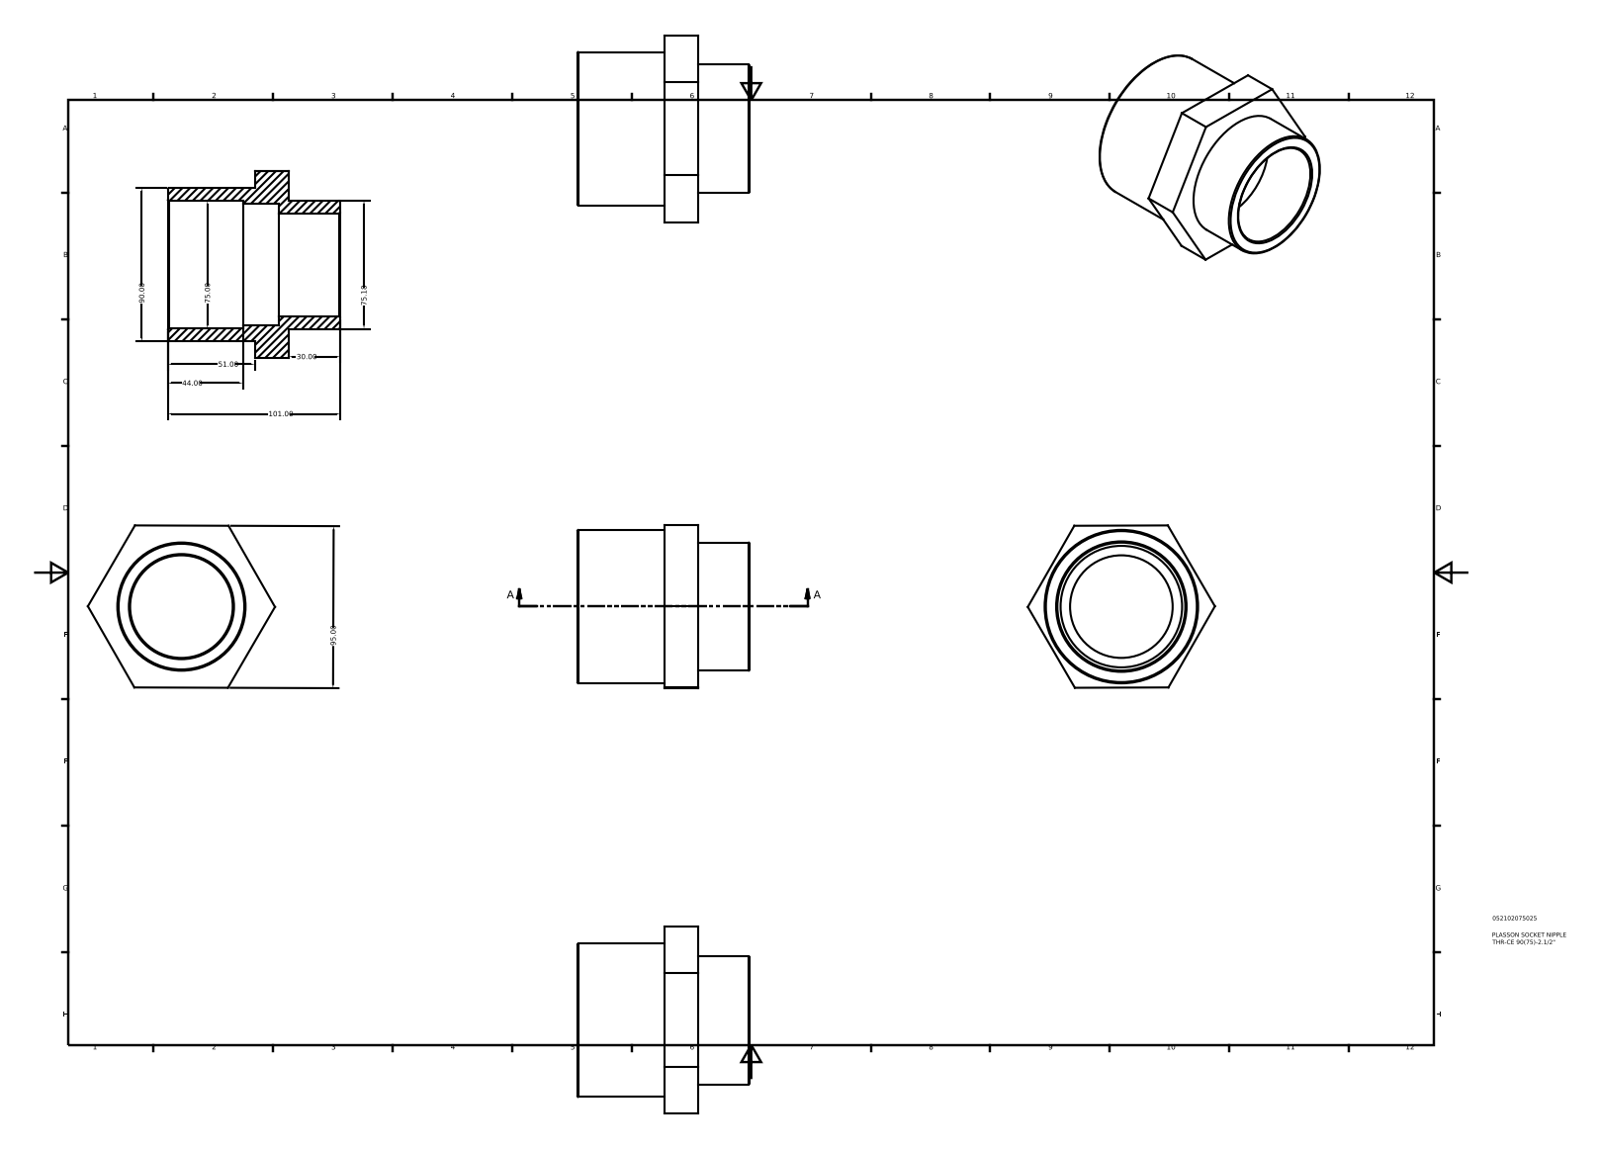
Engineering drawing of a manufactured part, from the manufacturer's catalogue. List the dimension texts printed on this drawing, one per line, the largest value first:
101.00
95.00
90.00
75.18
75.00
51.00
44.00
30.00
